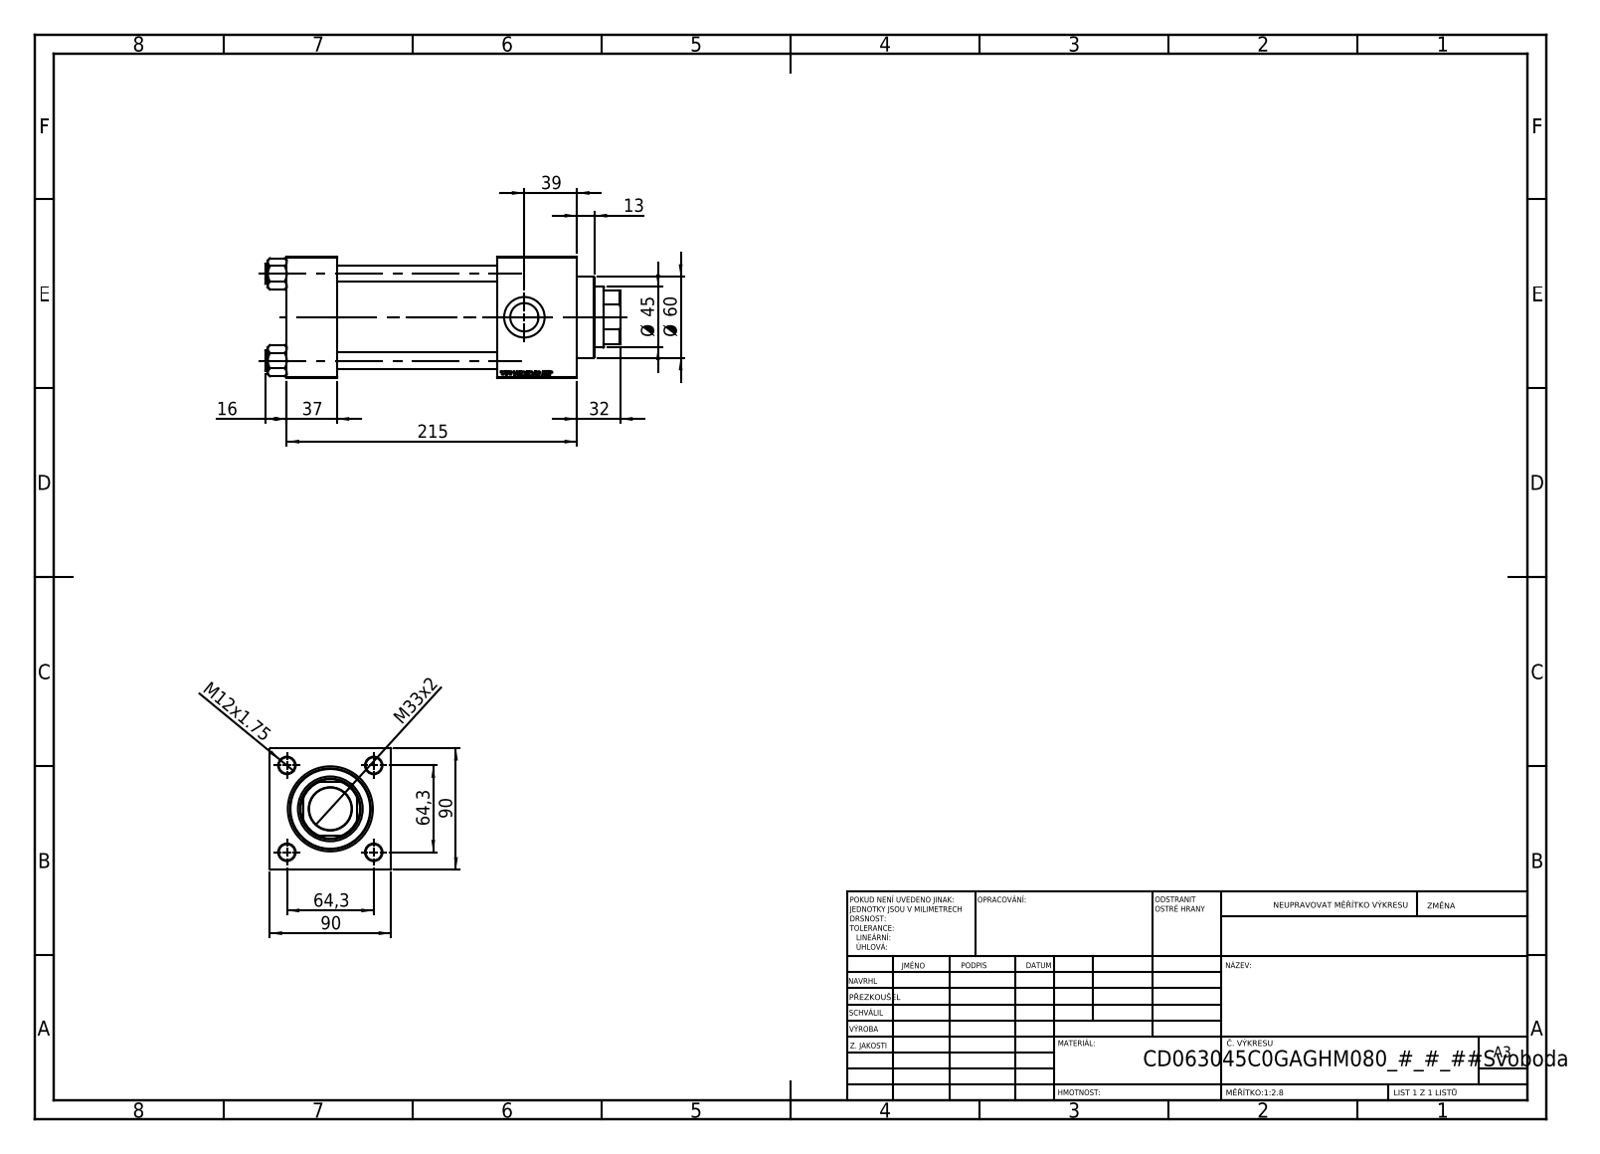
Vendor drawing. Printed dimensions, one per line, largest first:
215
90
90
64,3
64,3
Ø 60
Ø 45
39
37
M33x2
32
16
13
M12x1.75
